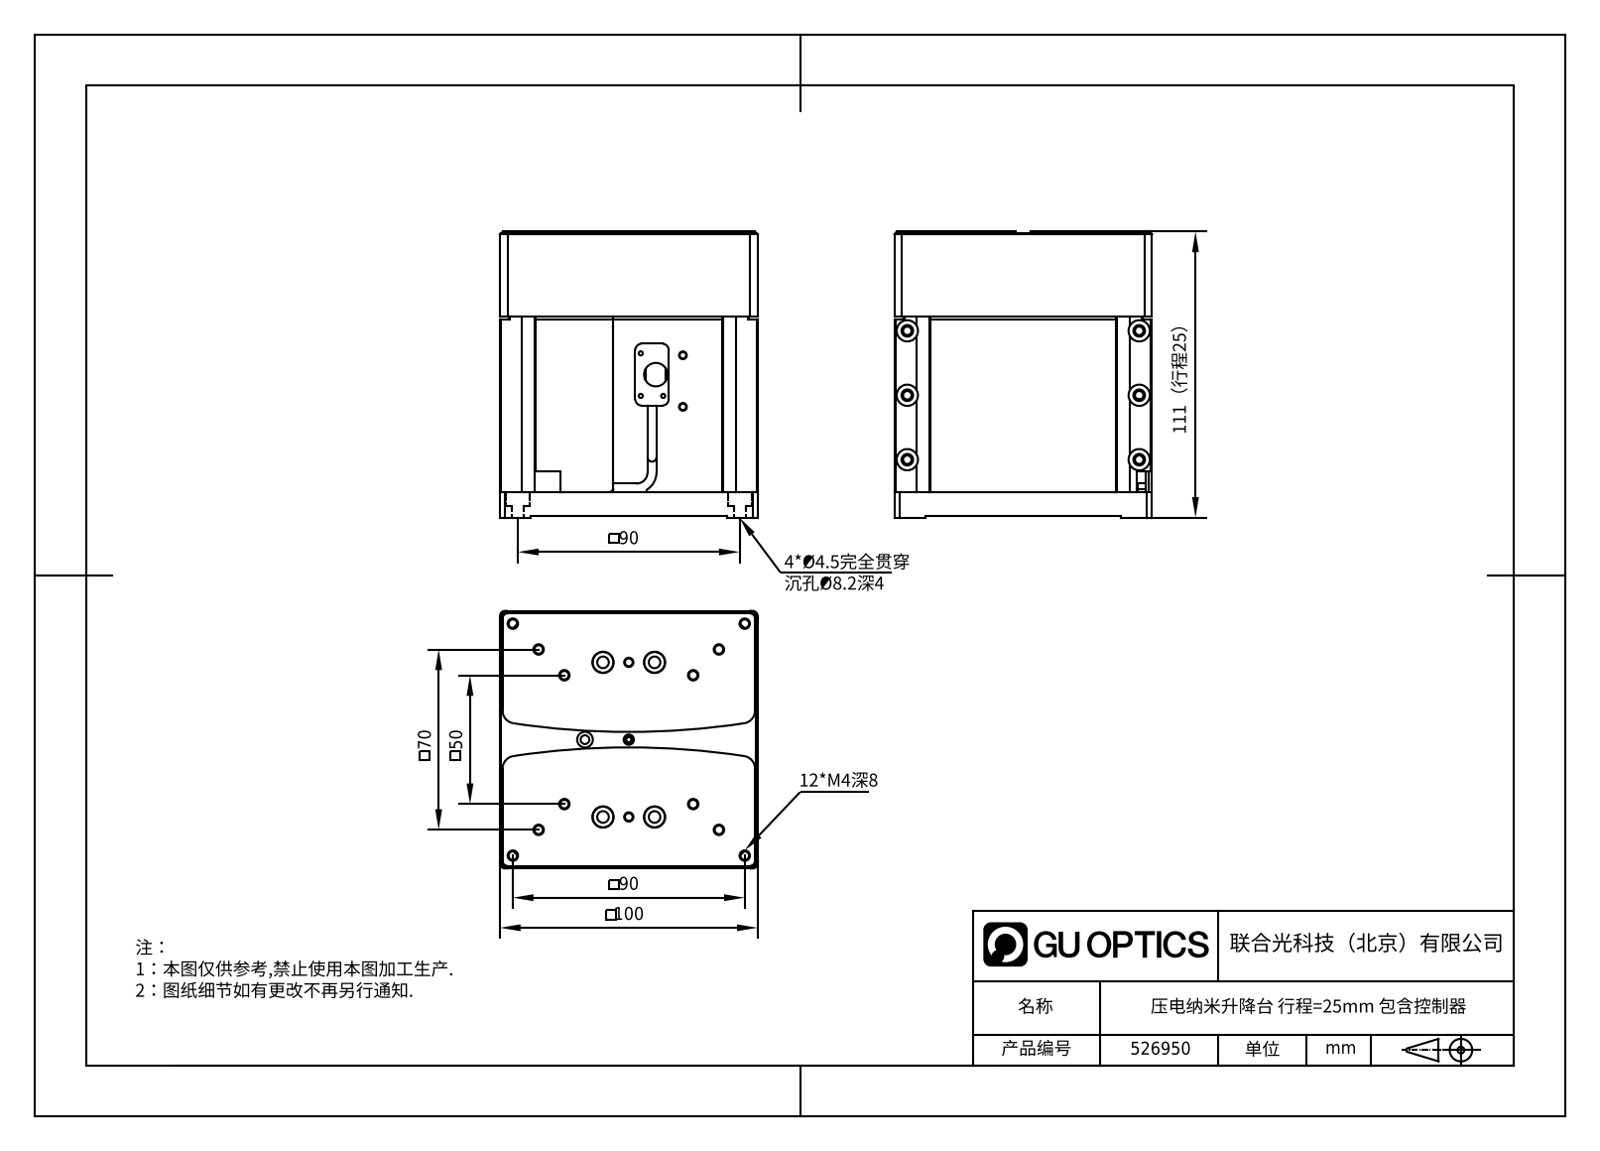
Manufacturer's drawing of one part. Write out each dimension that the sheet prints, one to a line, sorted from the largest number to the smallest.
111（行程25）
100
90
90
70
50
